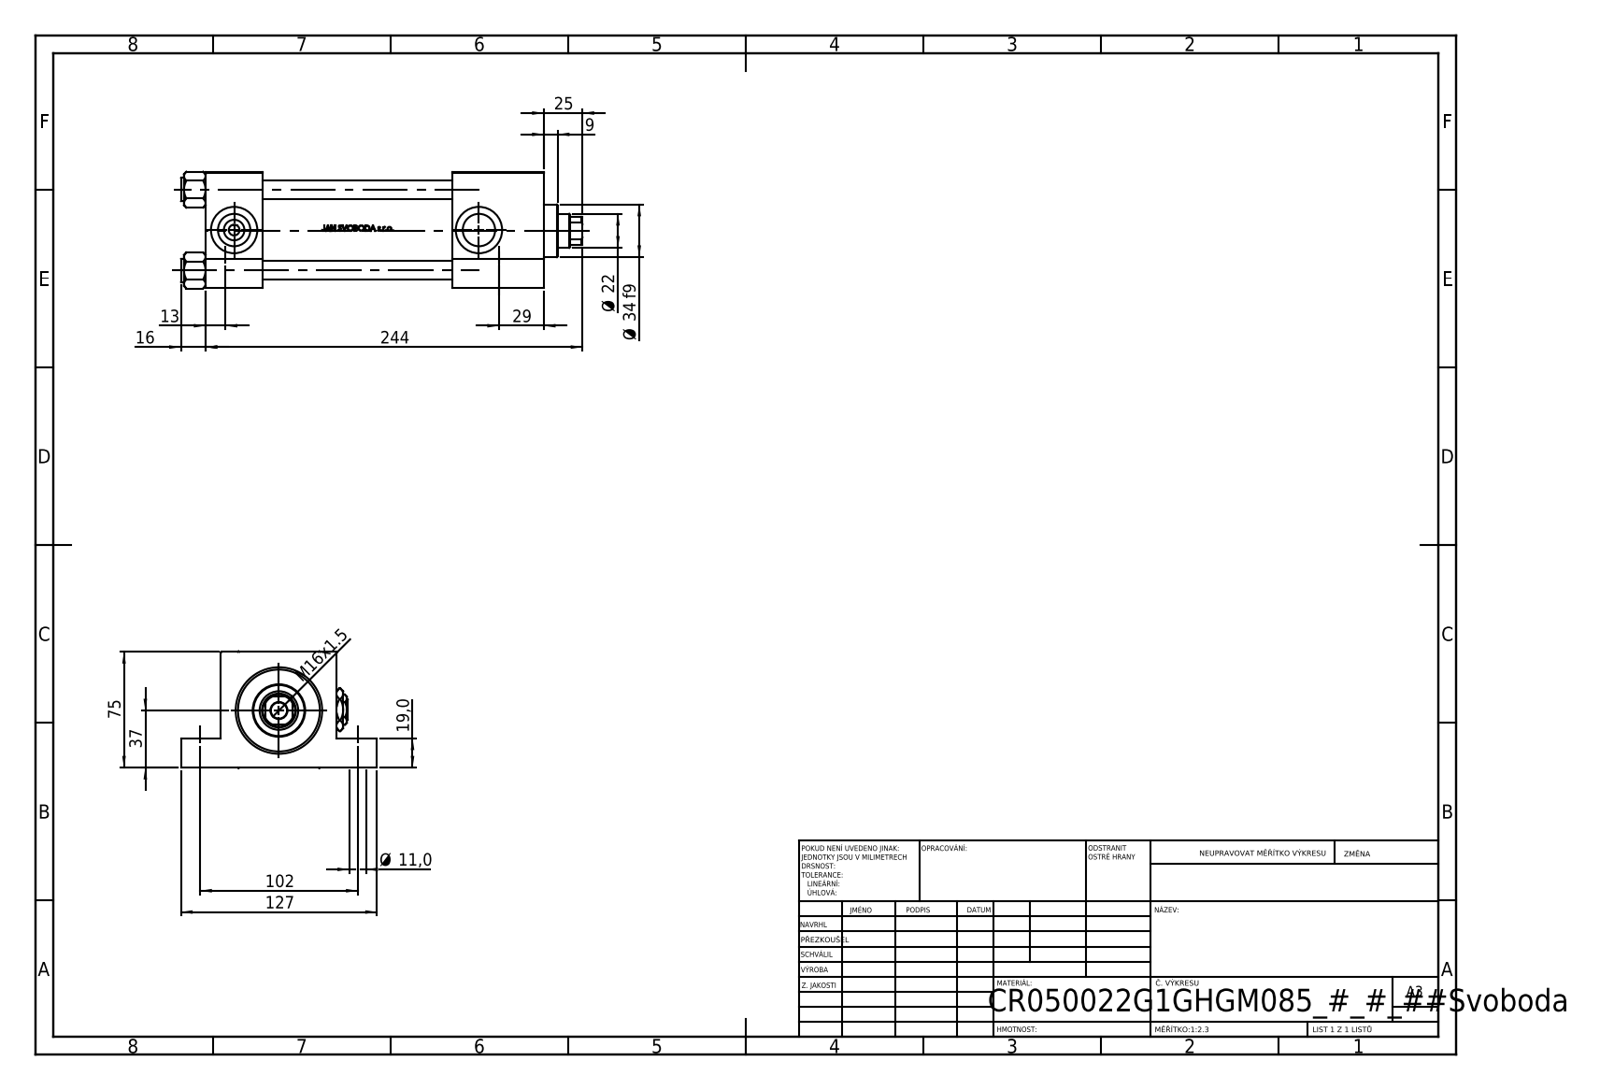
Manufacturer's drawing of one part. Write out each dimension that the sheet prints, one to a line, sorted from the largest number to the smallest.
244
127
102
75
37
Ø 34 f9
29
25
Ø 22
19,0
16
M16x1.5
13
Ø 11,0
9
